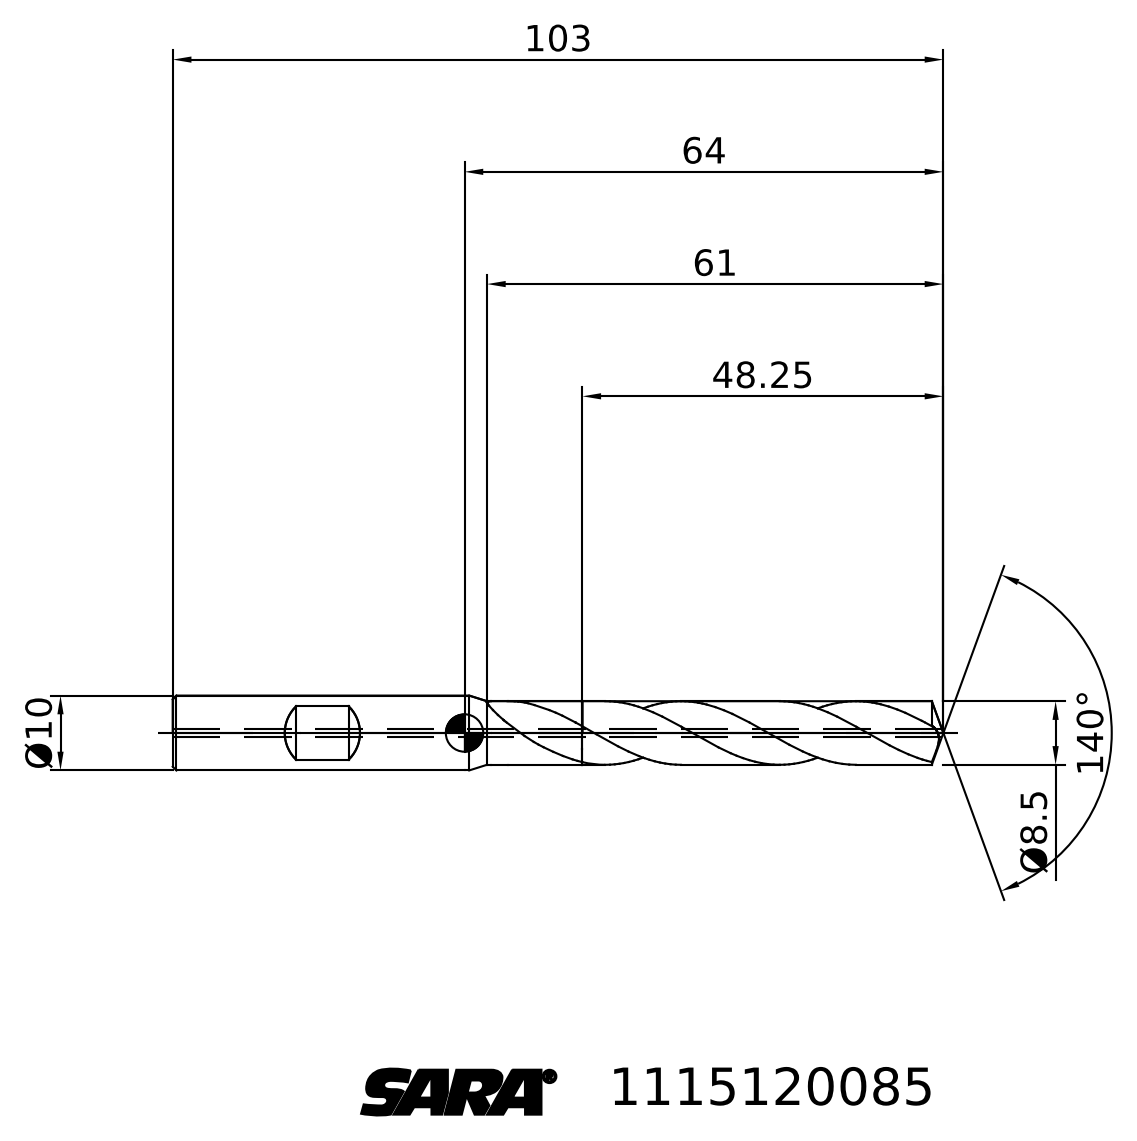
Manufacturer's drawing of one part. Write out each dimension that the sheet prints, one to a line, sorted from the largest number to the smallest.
140°
103
64
61
48.25
Ø10
Ø8.5
